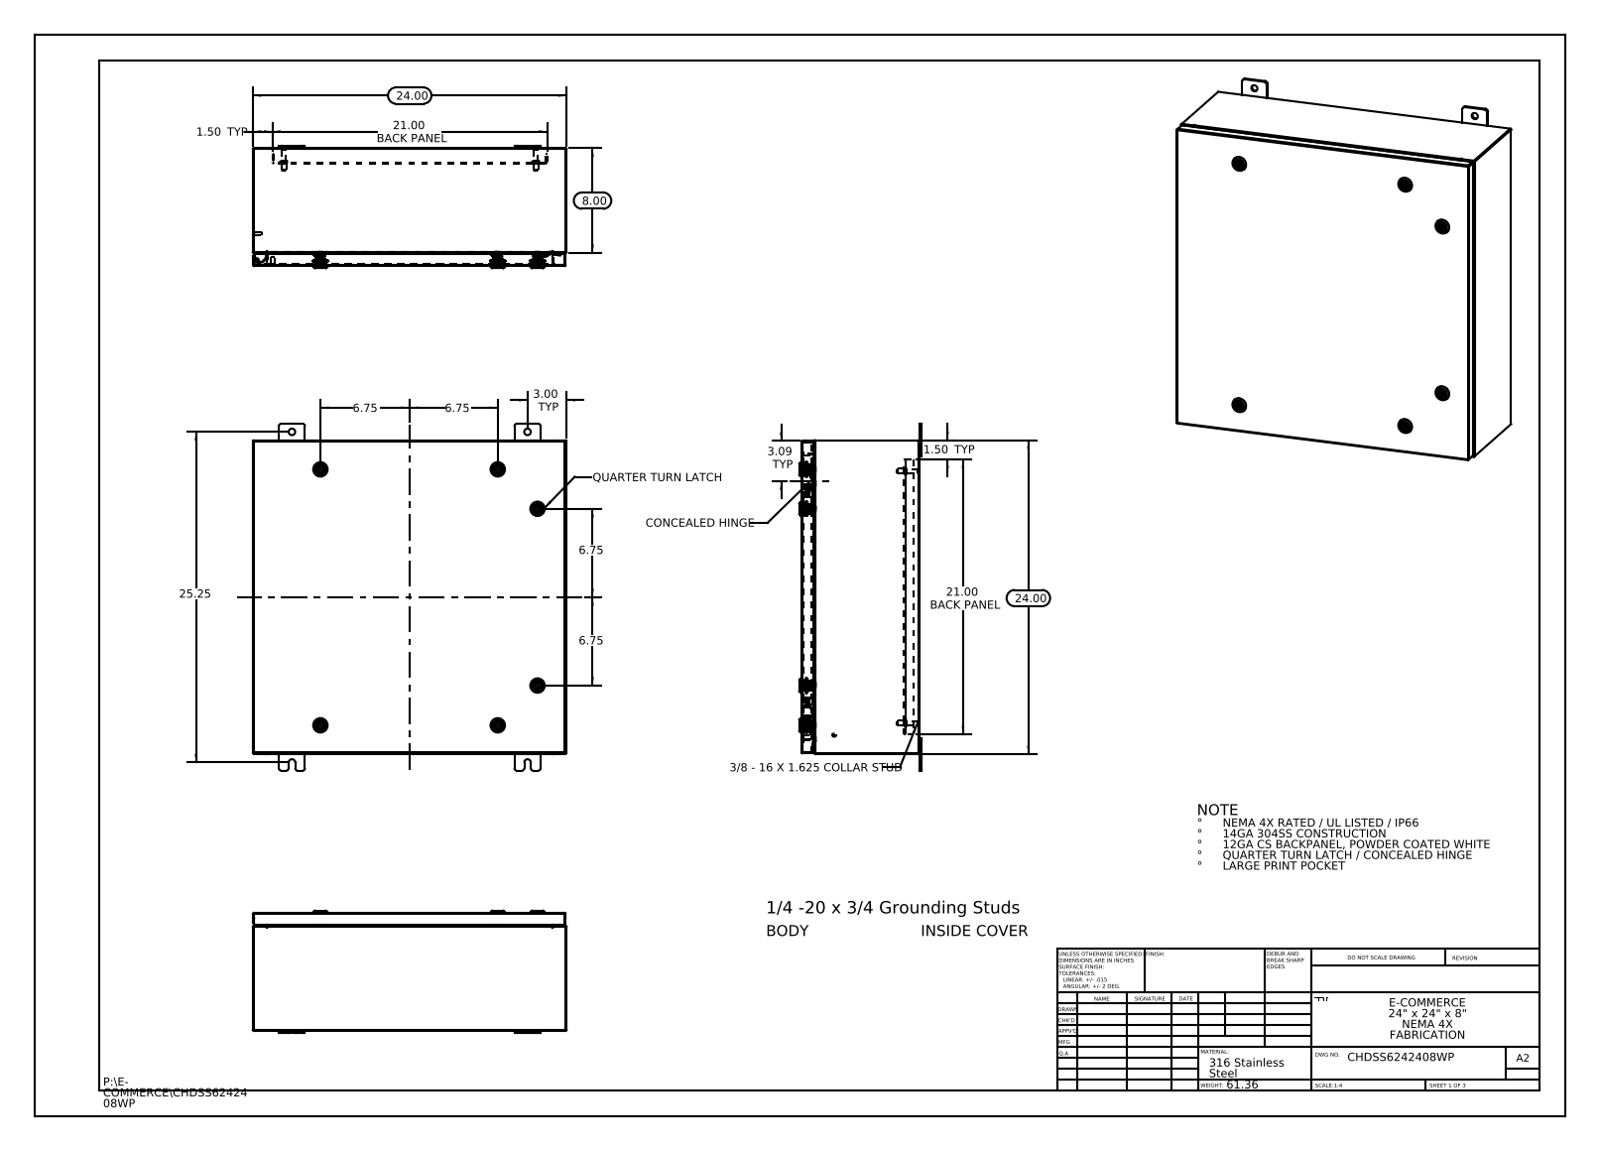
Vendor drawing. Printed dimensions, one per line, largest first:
25.25
24.00
24.00
21.00 BACK PANEL
21.00 BACK PANEL
8.00
6.75
6.75
6.75
6.75
3.09 TYP
3.00 TYP
1.50 TYP
1.50 TYP
